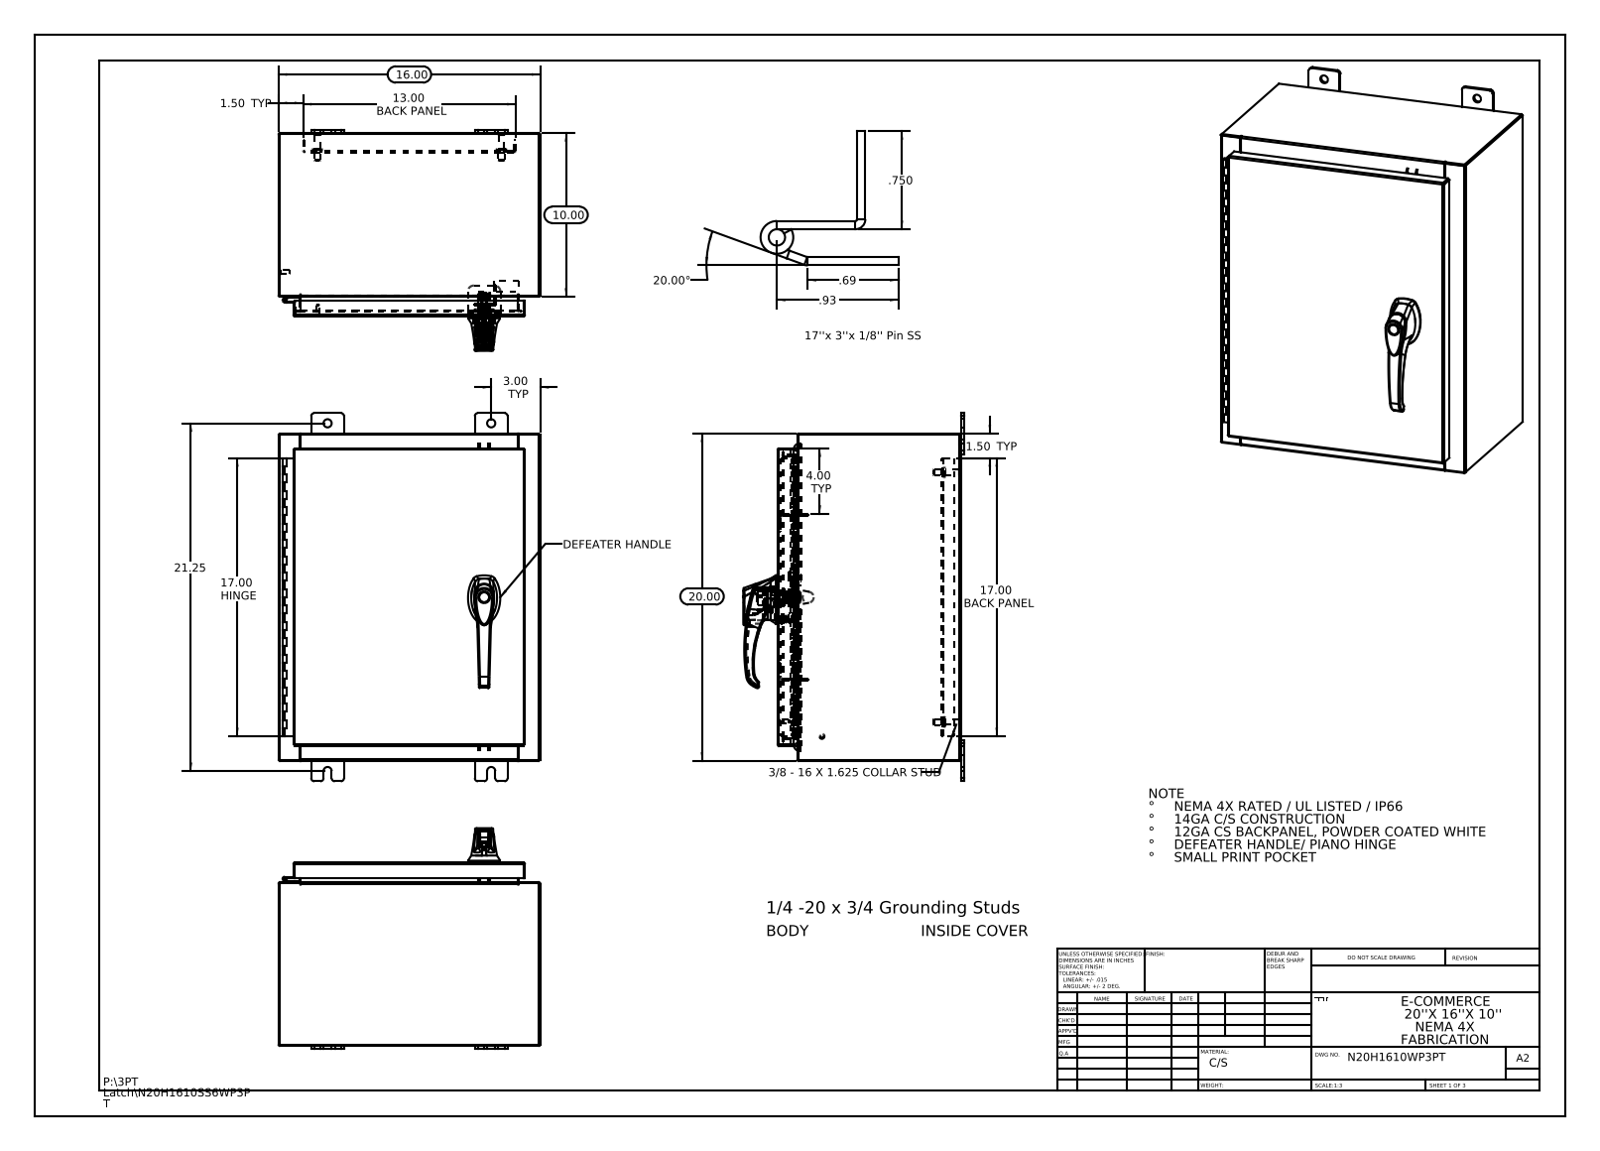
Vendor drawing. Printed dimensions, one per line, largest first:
21.25
20.00
20.00°
17.00 HINGE
17.00 BACK PANEL
16.00
13.00 BACK PANEL
10.00
4.00 TYP
3.00 TYP
1.50 TYP
1.50 TYP
.93
.750
.69
